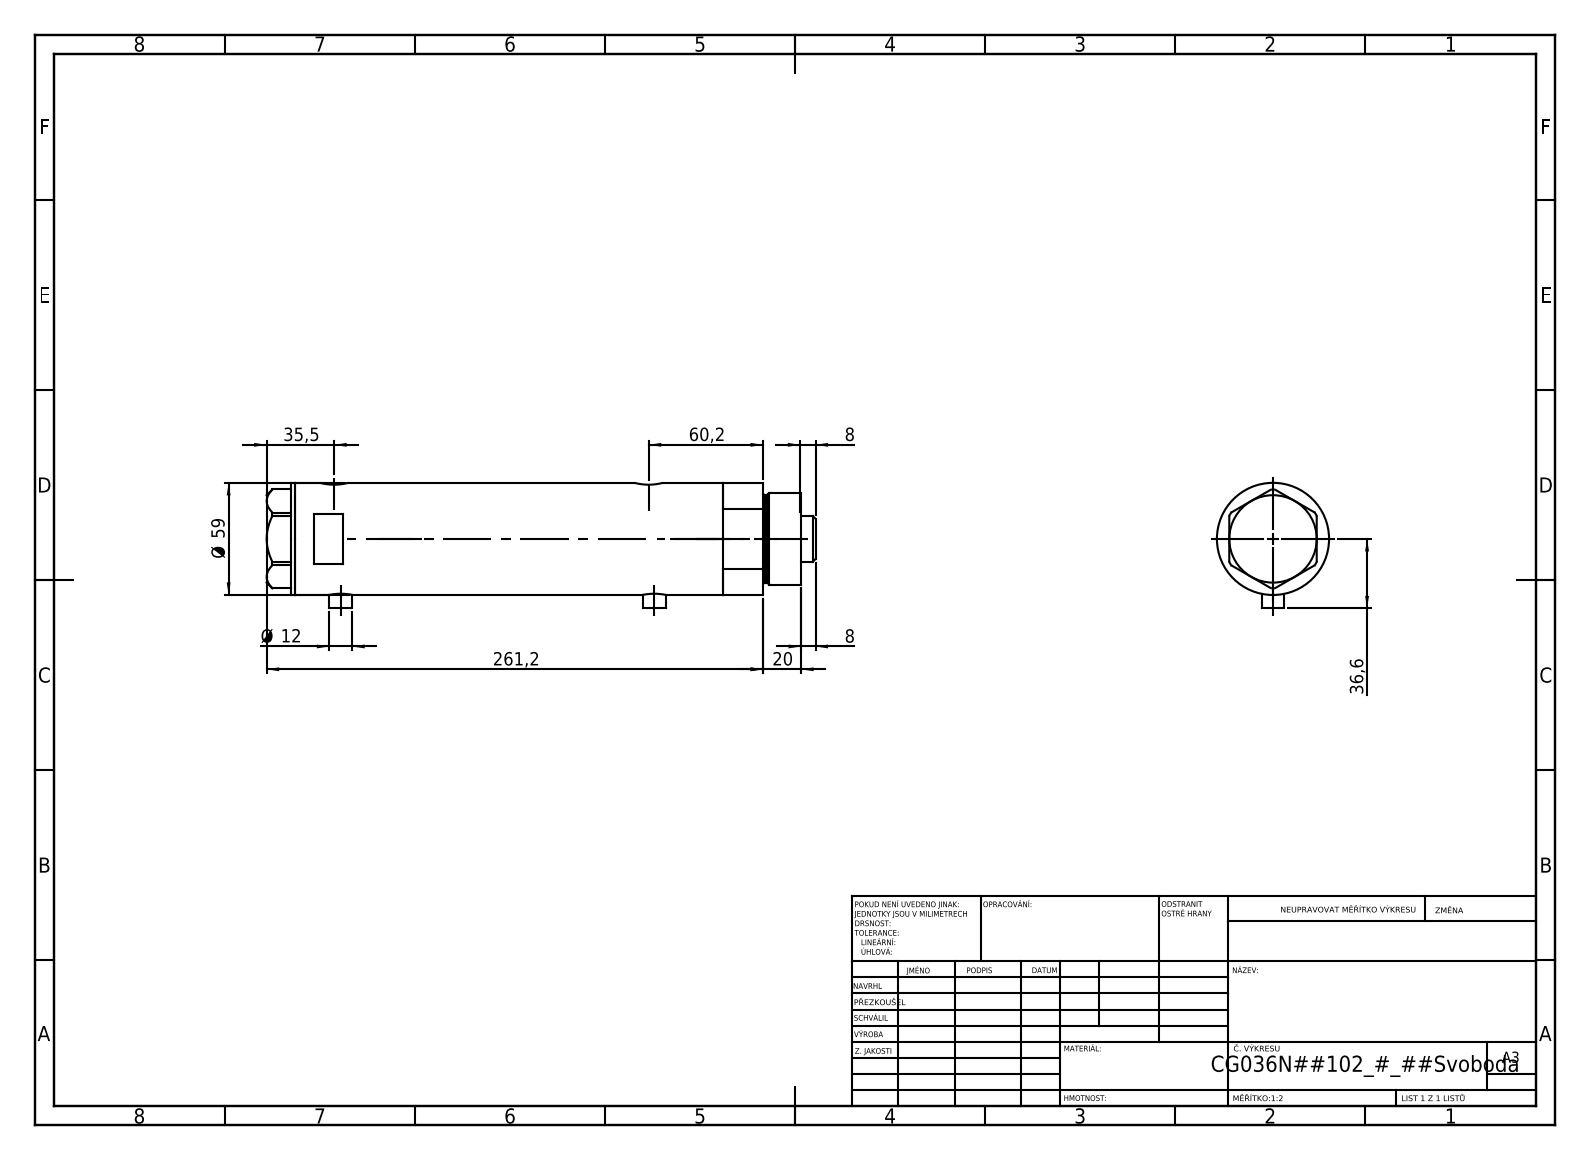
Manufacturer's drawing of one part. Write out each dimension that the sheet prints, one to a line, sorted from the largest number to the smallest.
261,2
60,2
Ø 59
36,6
35,5
20
Ø 12
8
8
